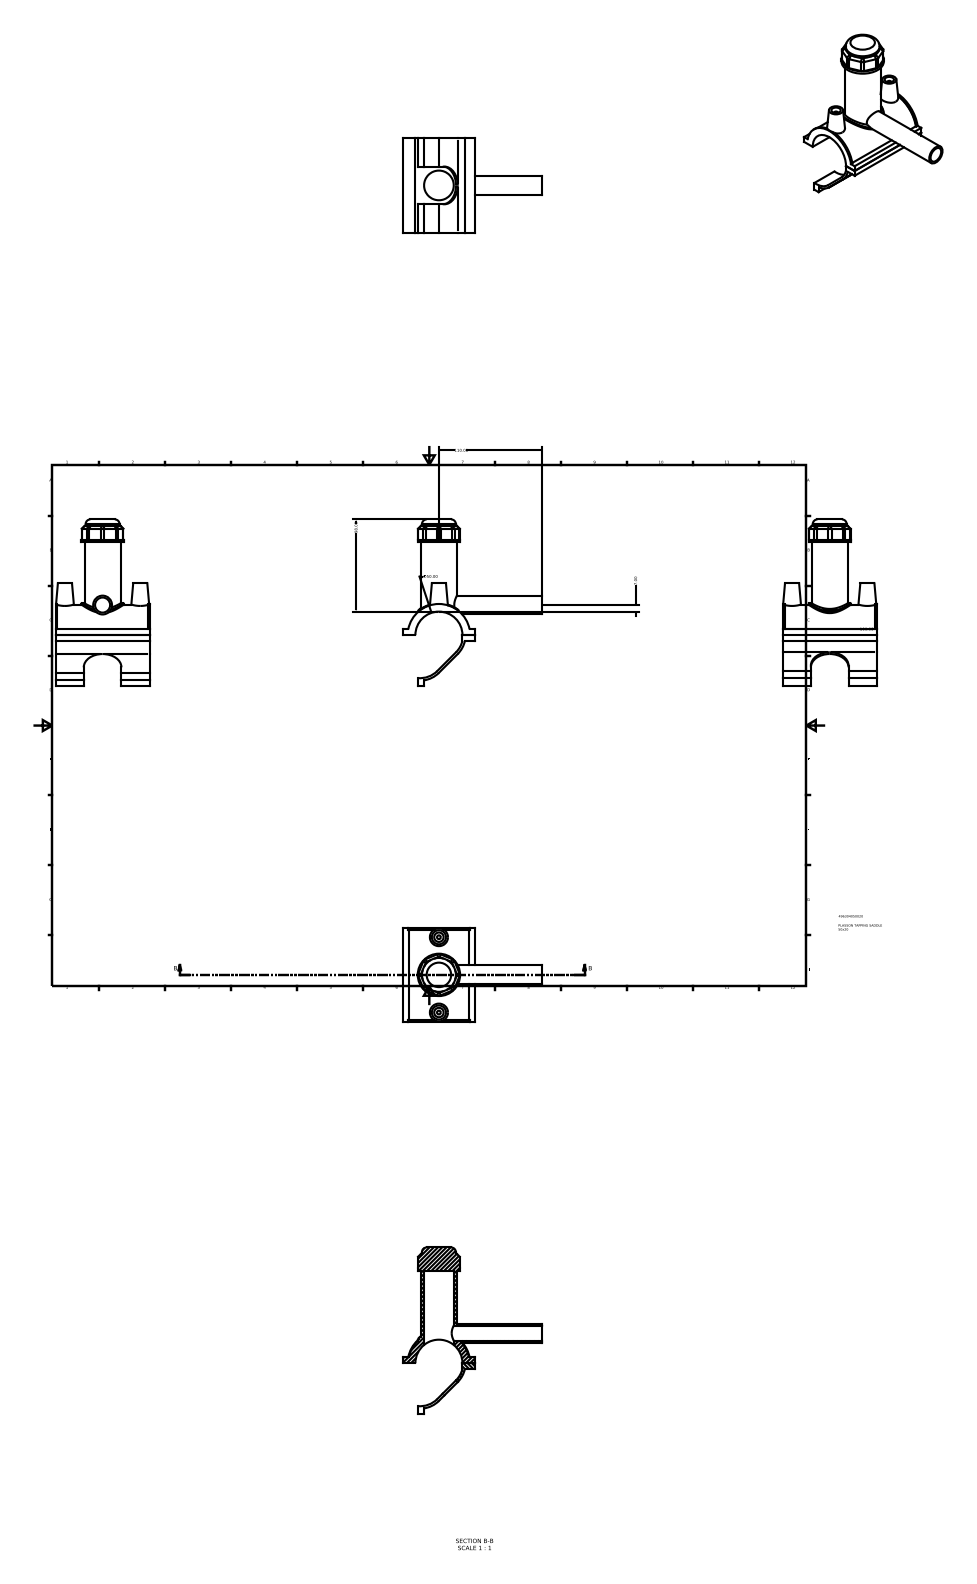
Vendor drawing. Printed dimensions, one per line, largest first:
110.00
100.00
98.00
∅50.00
7.00
